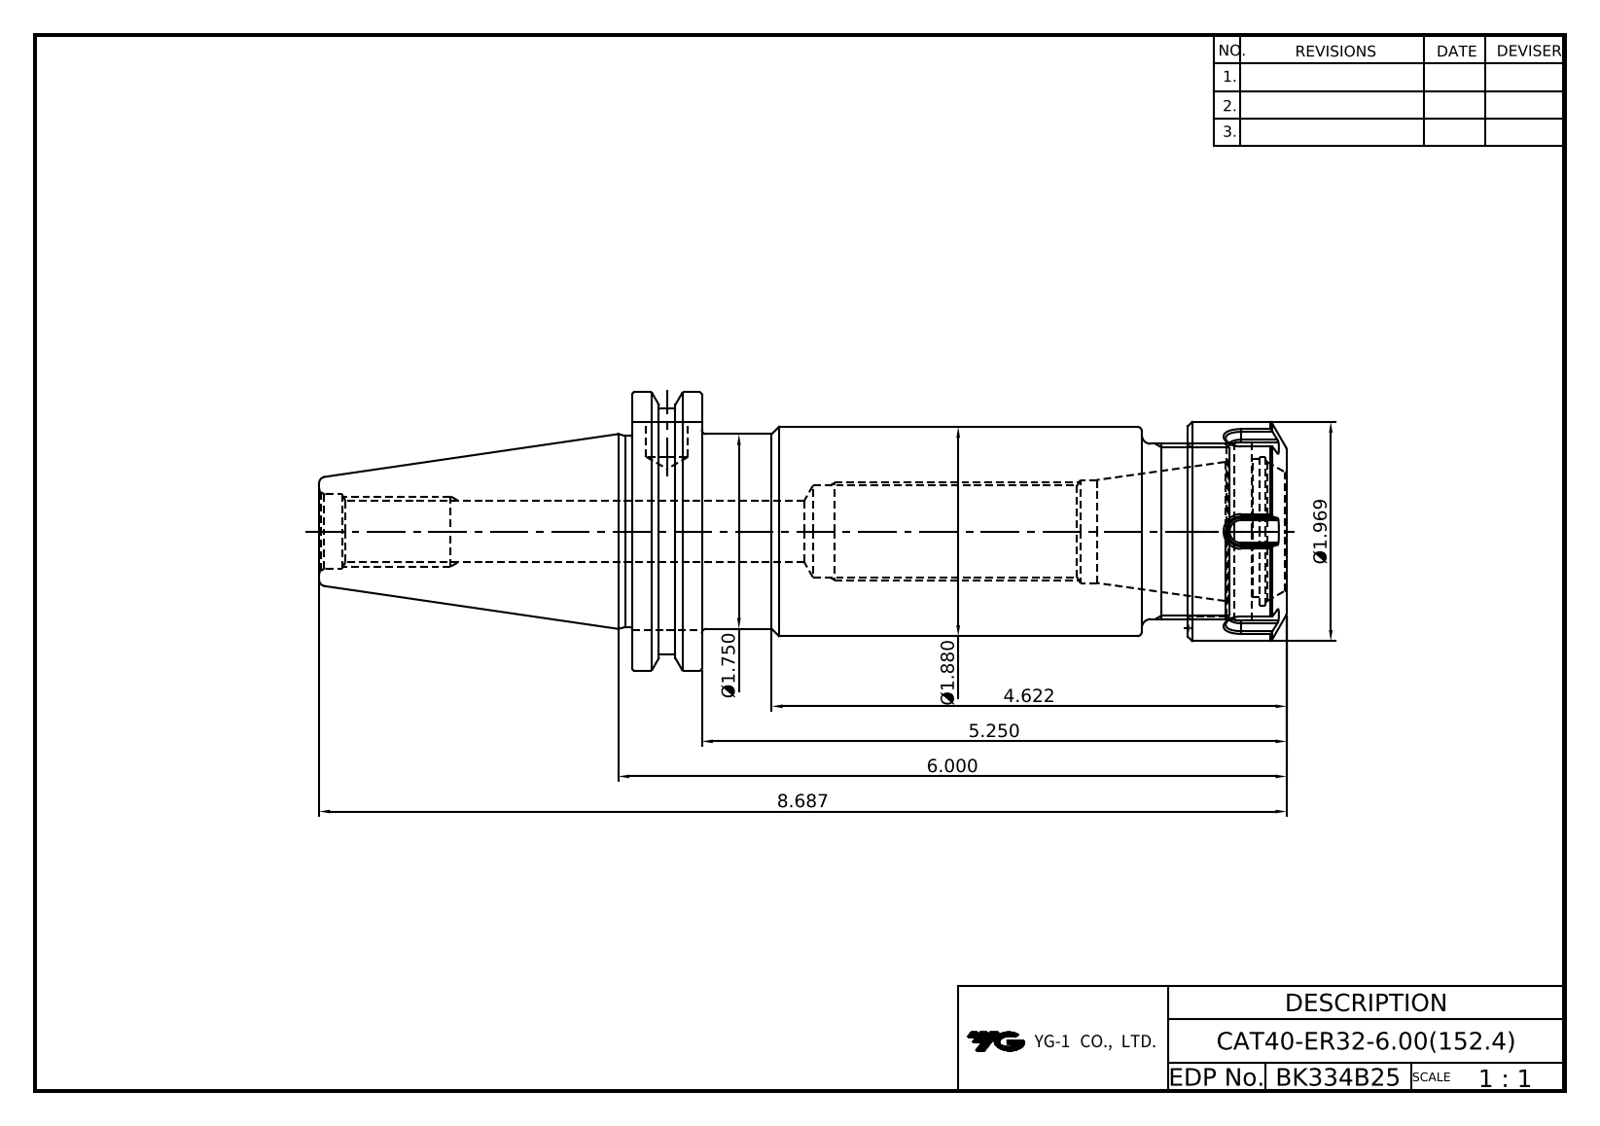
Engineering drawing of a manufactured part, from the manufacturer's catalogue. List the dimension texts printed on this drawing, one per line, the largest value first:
8.687
6.000
5.250
4.622
Ø1.969
Ø1.880
Ø1.750
